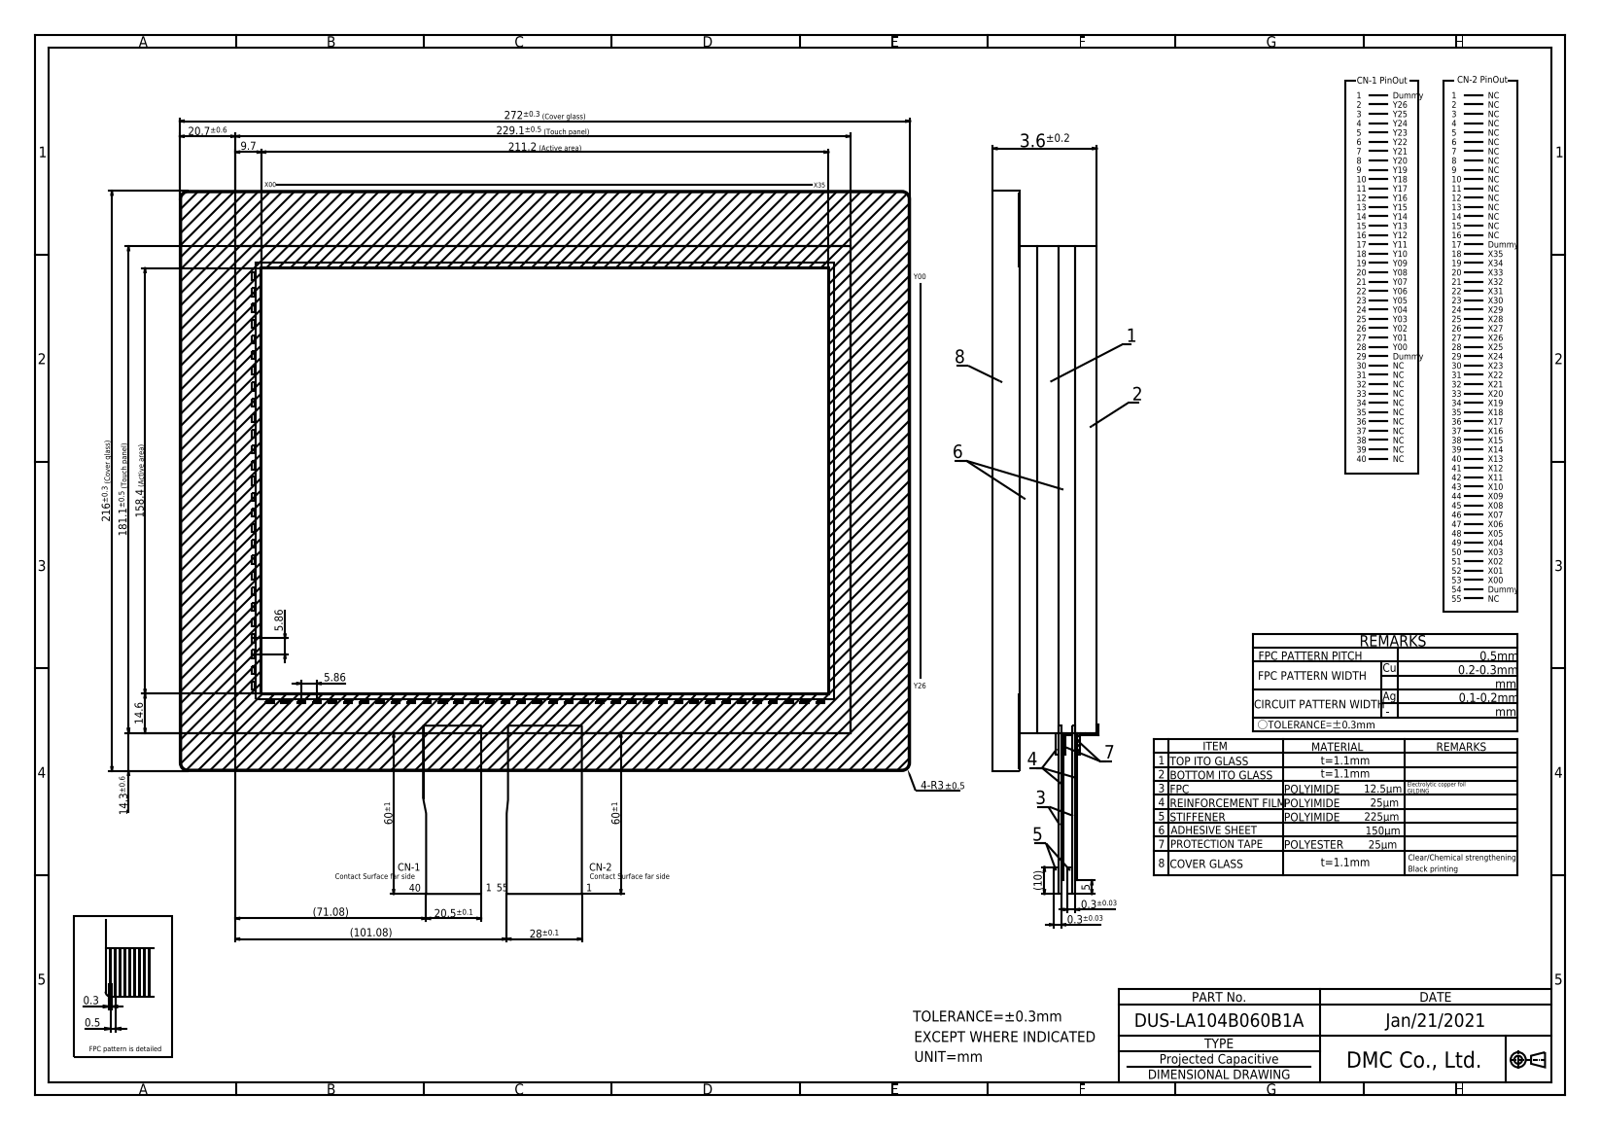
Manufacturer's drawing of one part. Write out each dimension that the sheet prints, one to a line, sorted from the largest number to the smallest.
272±0.3 (Cover glass)
229.1±0.5 (Touch panel)
216±0.3 (Cover glass)
211.2 (Active area)
181.1±0.5 (Touch panel)
158.4 (Active area)
(101.08)
(71.08)
60±1
60±1
28±0.1
20.7±0.6
20.5±0.1
14.6
14.3±0.6
(10)
9.7
5.86
5.86
5
3.6±0.2
0.5
0.3±0.03
0.3±0.03
0.3
